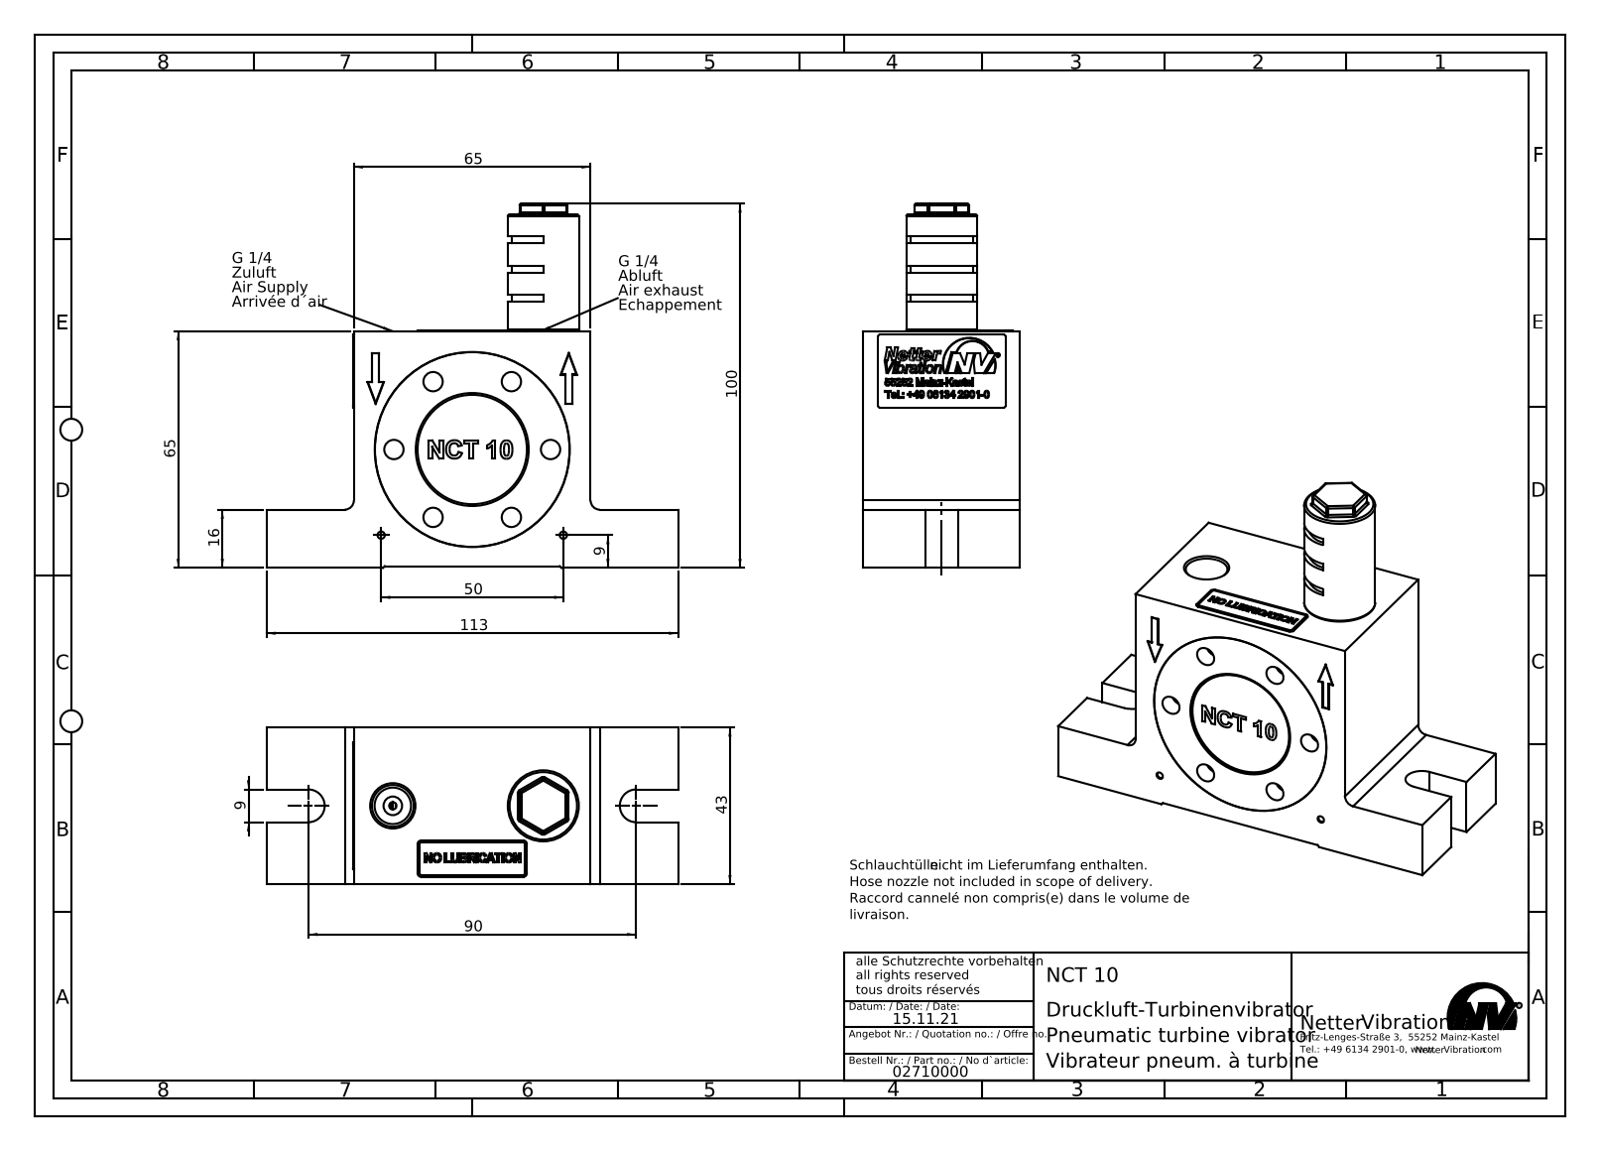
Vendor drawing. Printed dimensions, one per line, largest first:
113
100
90
65
65
50
43
16
9
9
